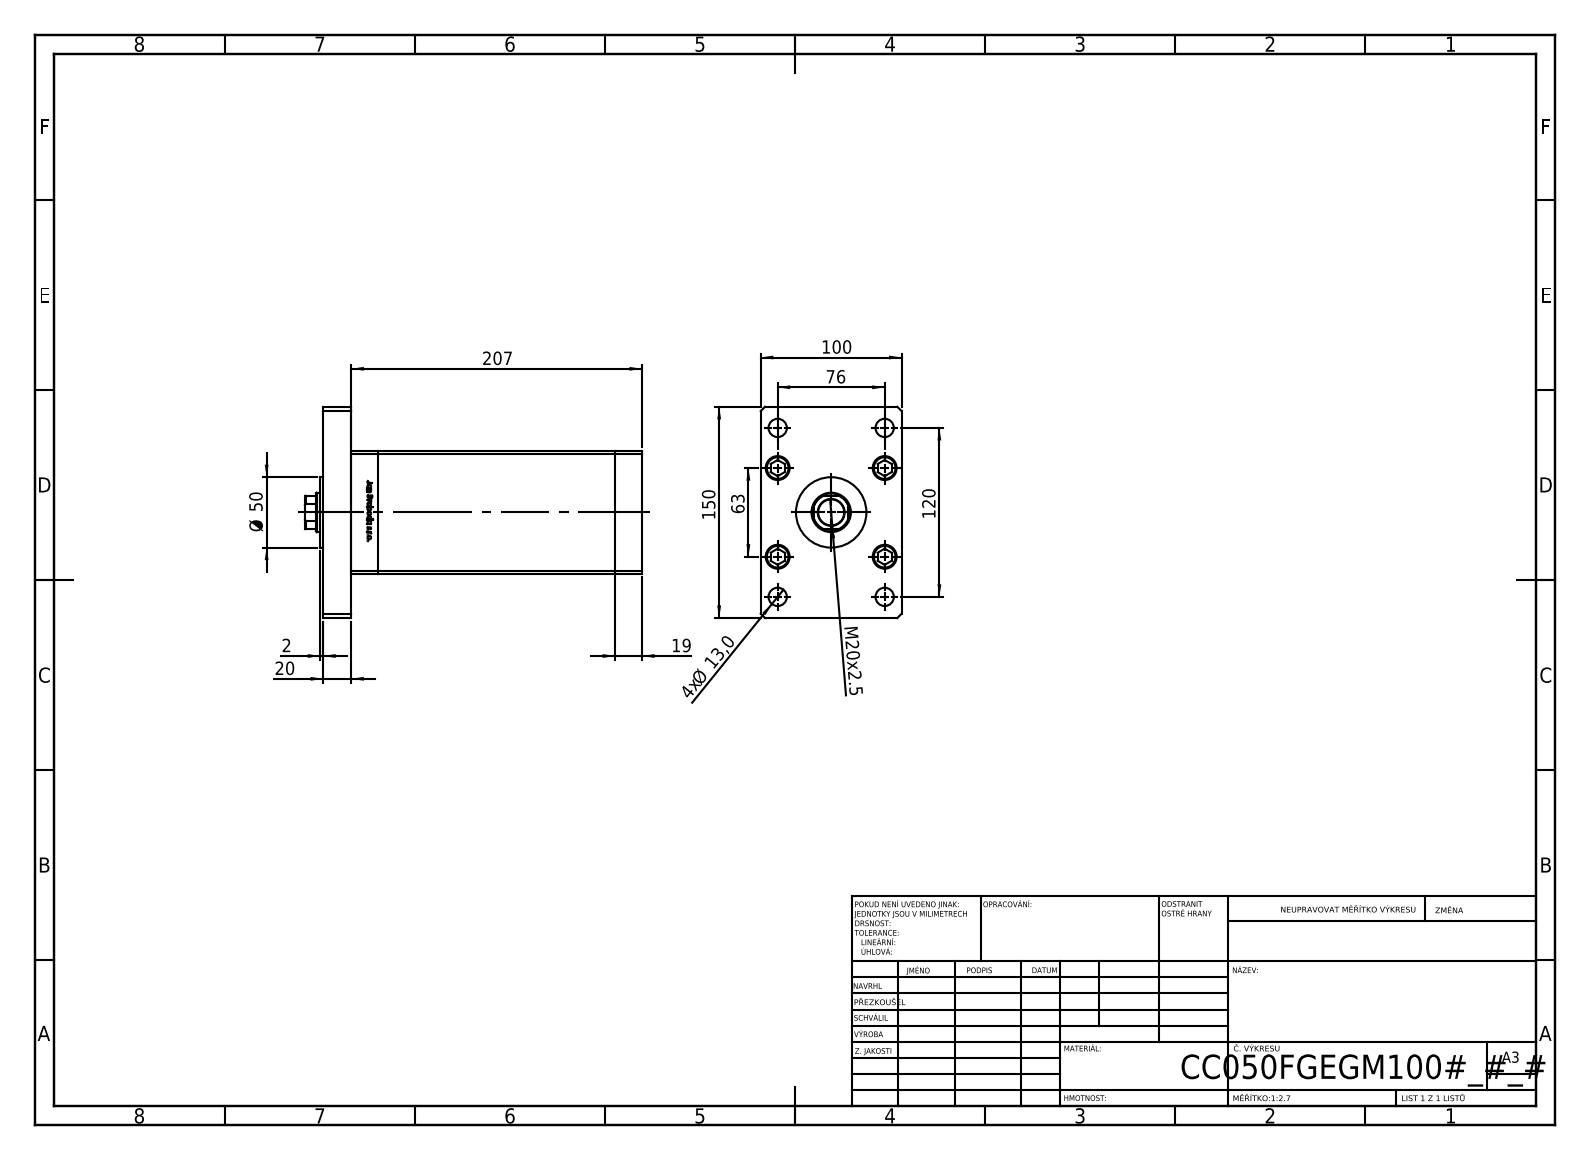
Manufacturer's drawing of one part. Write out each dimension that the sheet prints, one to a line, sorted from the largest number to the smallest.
207
150
120
100
76
63
Ø 50
20
M20x2.5
19
4x Ø 13,0
2
